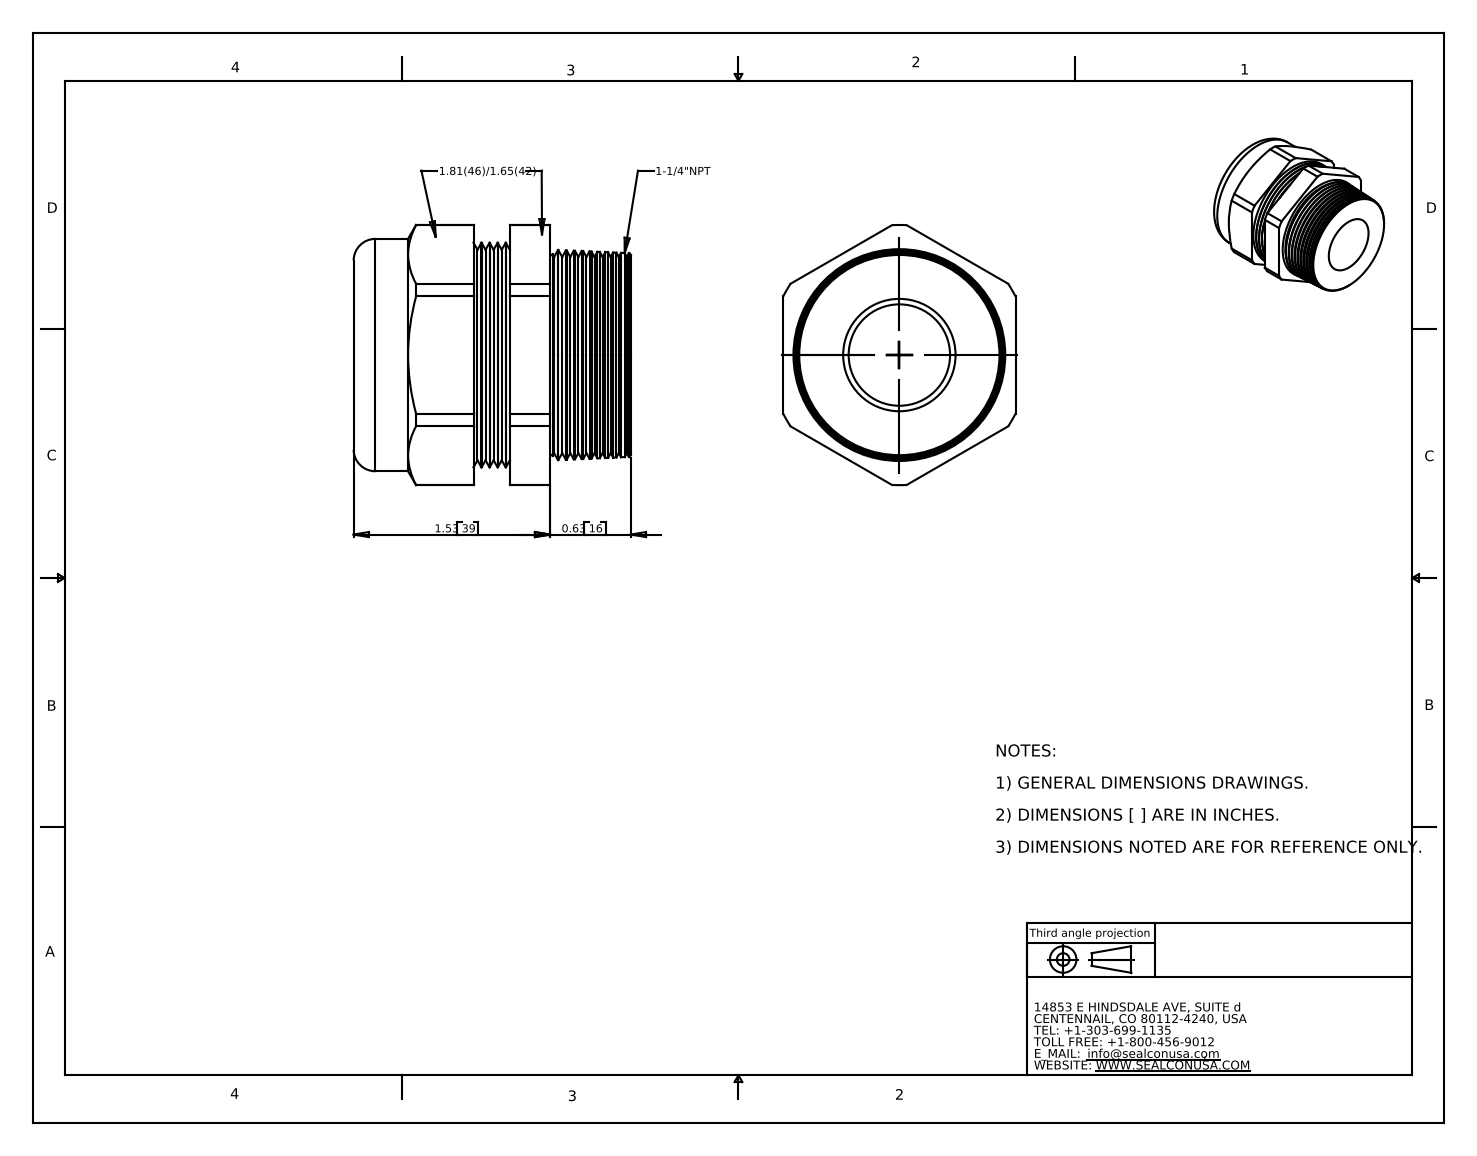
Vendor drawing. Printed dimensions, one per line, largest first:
1.53 39
0.63 16
